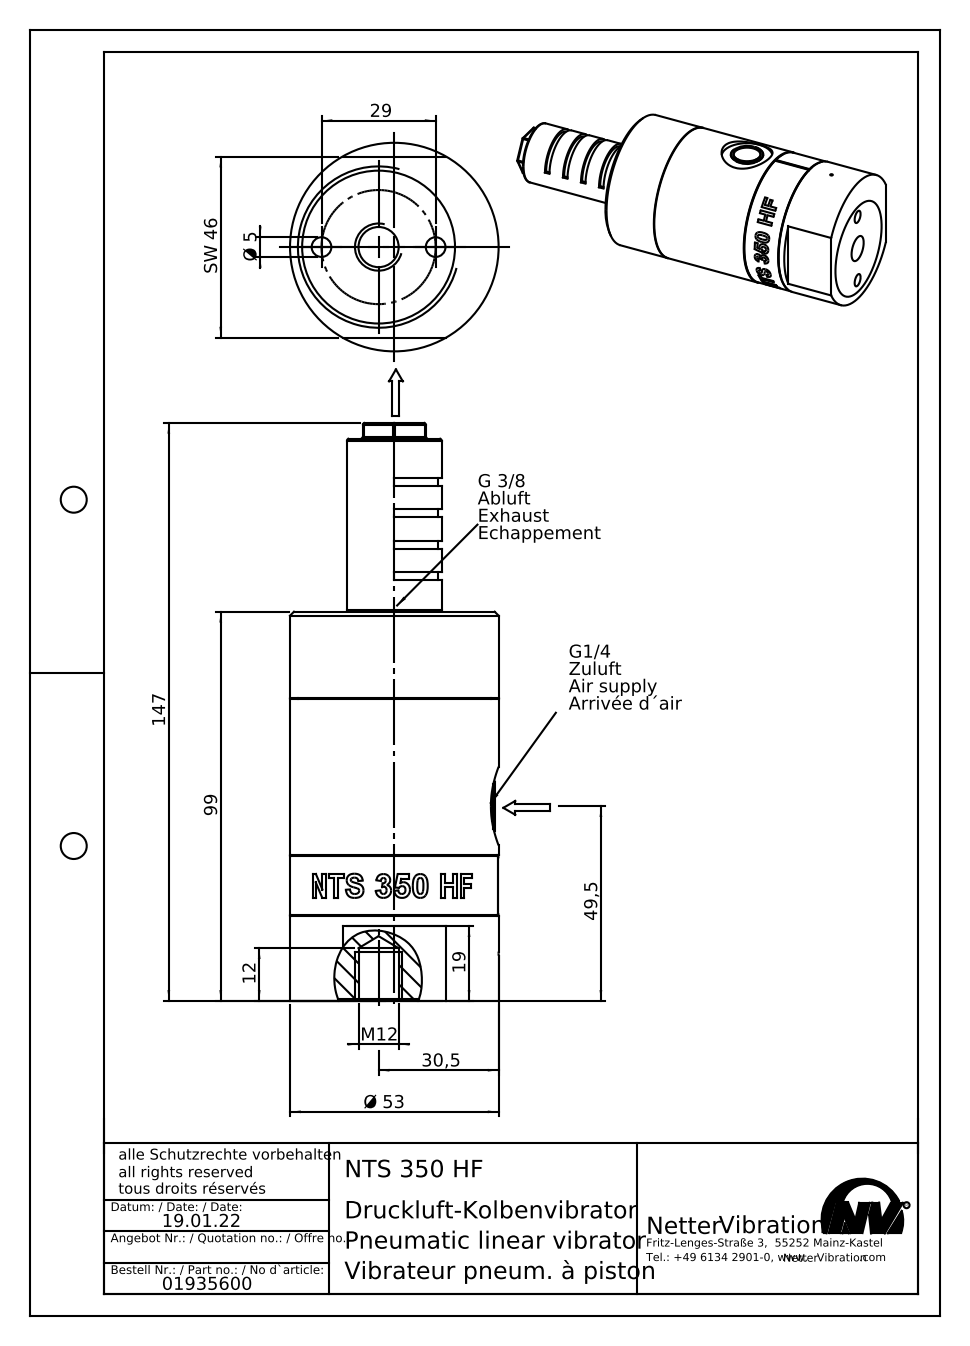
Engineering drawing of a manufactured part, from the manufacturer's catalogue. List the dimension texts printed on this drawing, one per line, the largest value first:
147
99
Ø 53
49,5
SW 46
30,5
29
19
12
M12
Ø 5
